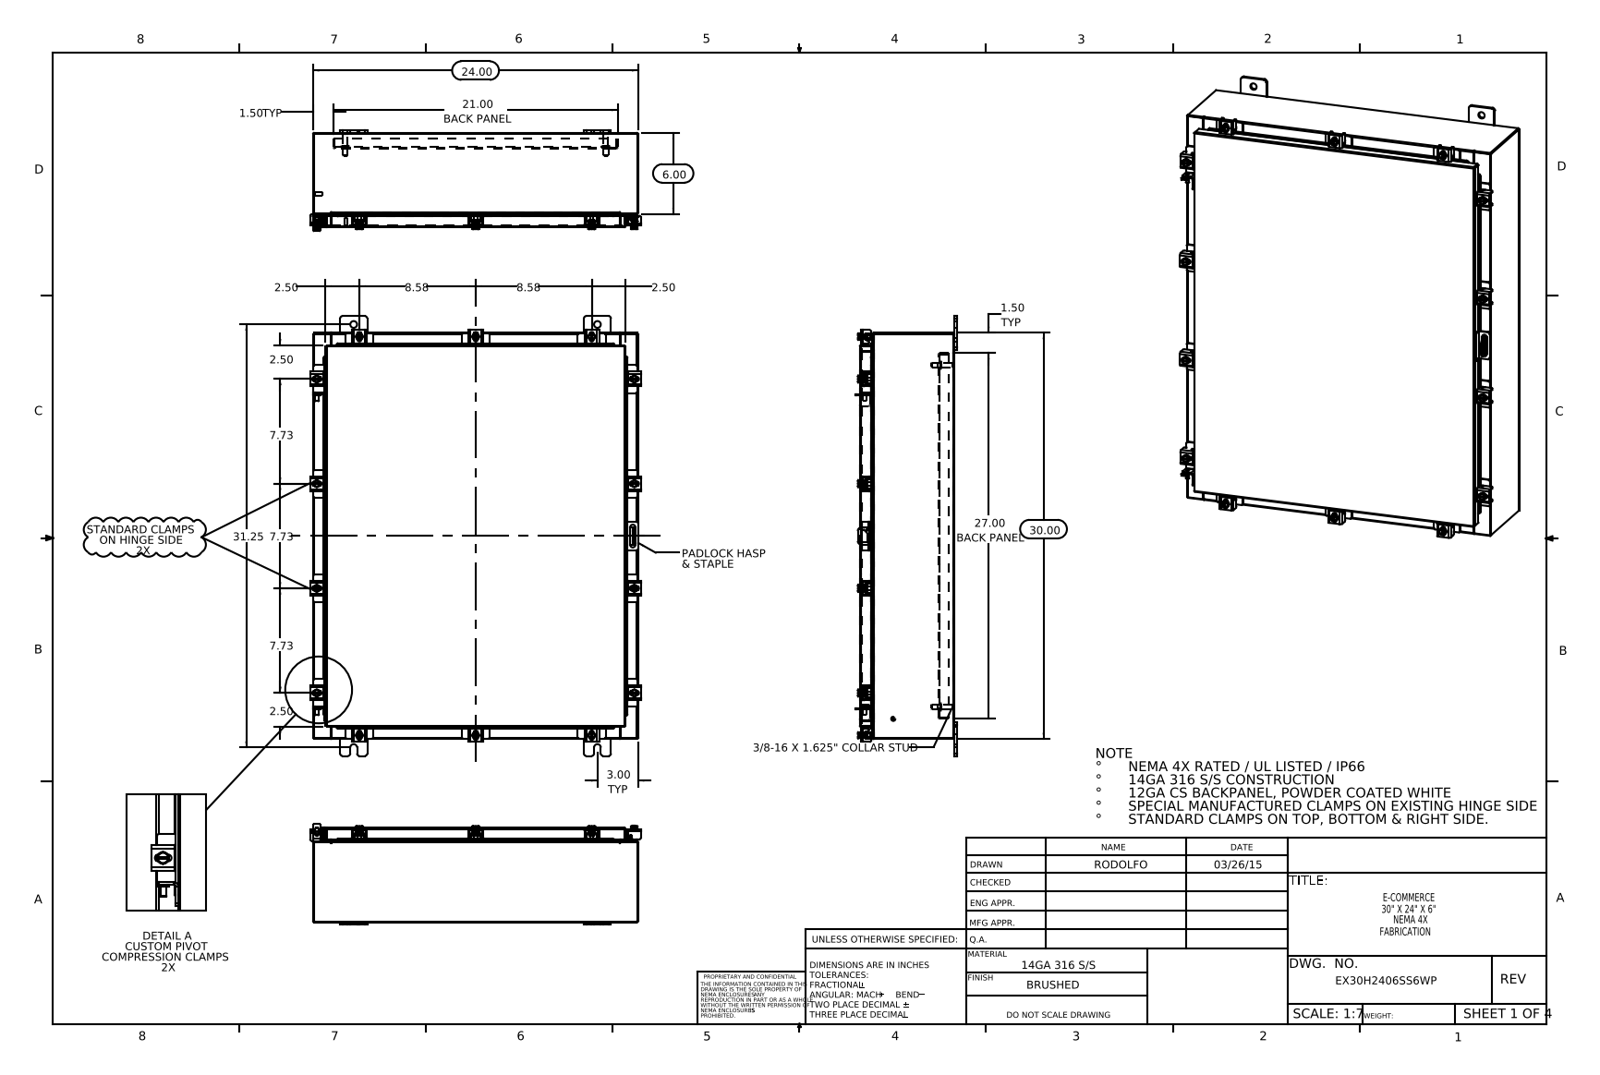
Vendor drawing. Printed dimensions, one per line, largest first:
31.25
30.00
27.00 BACK PANEL
24.00
21.00 BACK PANEL
8.58
8.58
7.73
7.73
7.73
6.00
3.00 TYP
2.50
2.50
2.50
2.50
1.50 TYP
1.50 TYP
